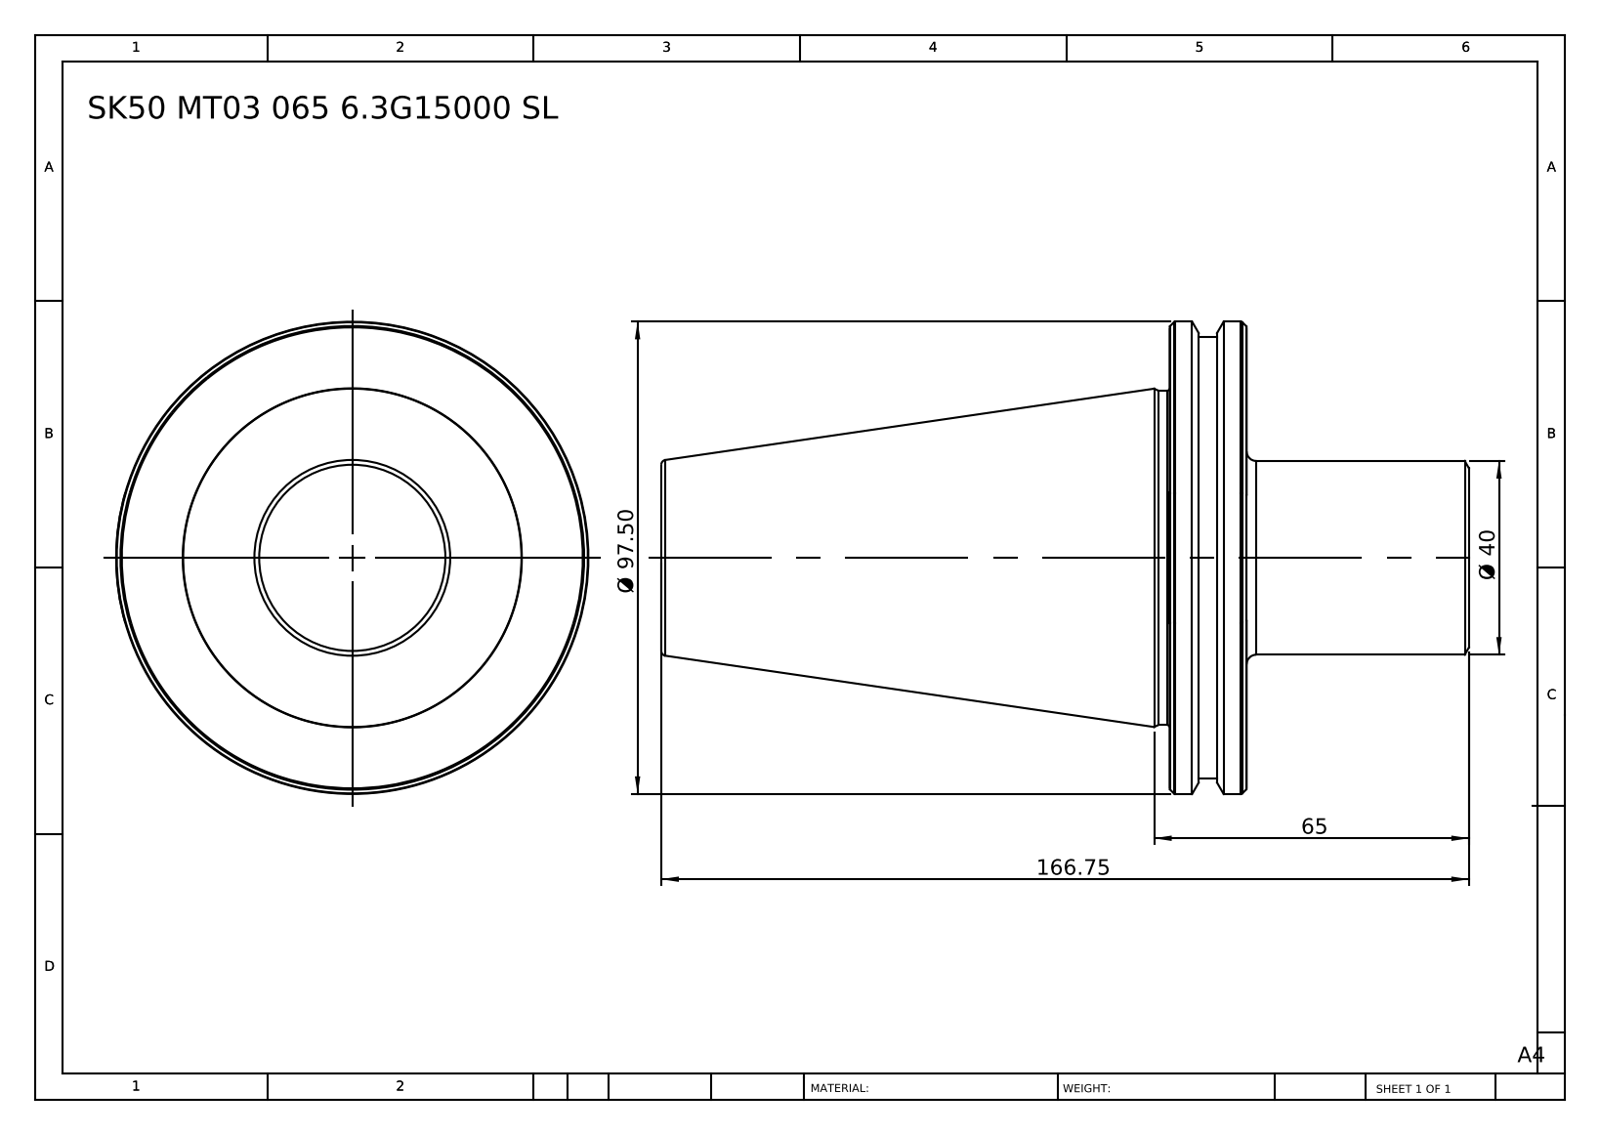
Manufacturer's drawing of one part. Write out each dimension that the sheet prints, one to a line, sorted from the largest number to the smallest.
166.75
Ø 97.50
65
Ø 40
